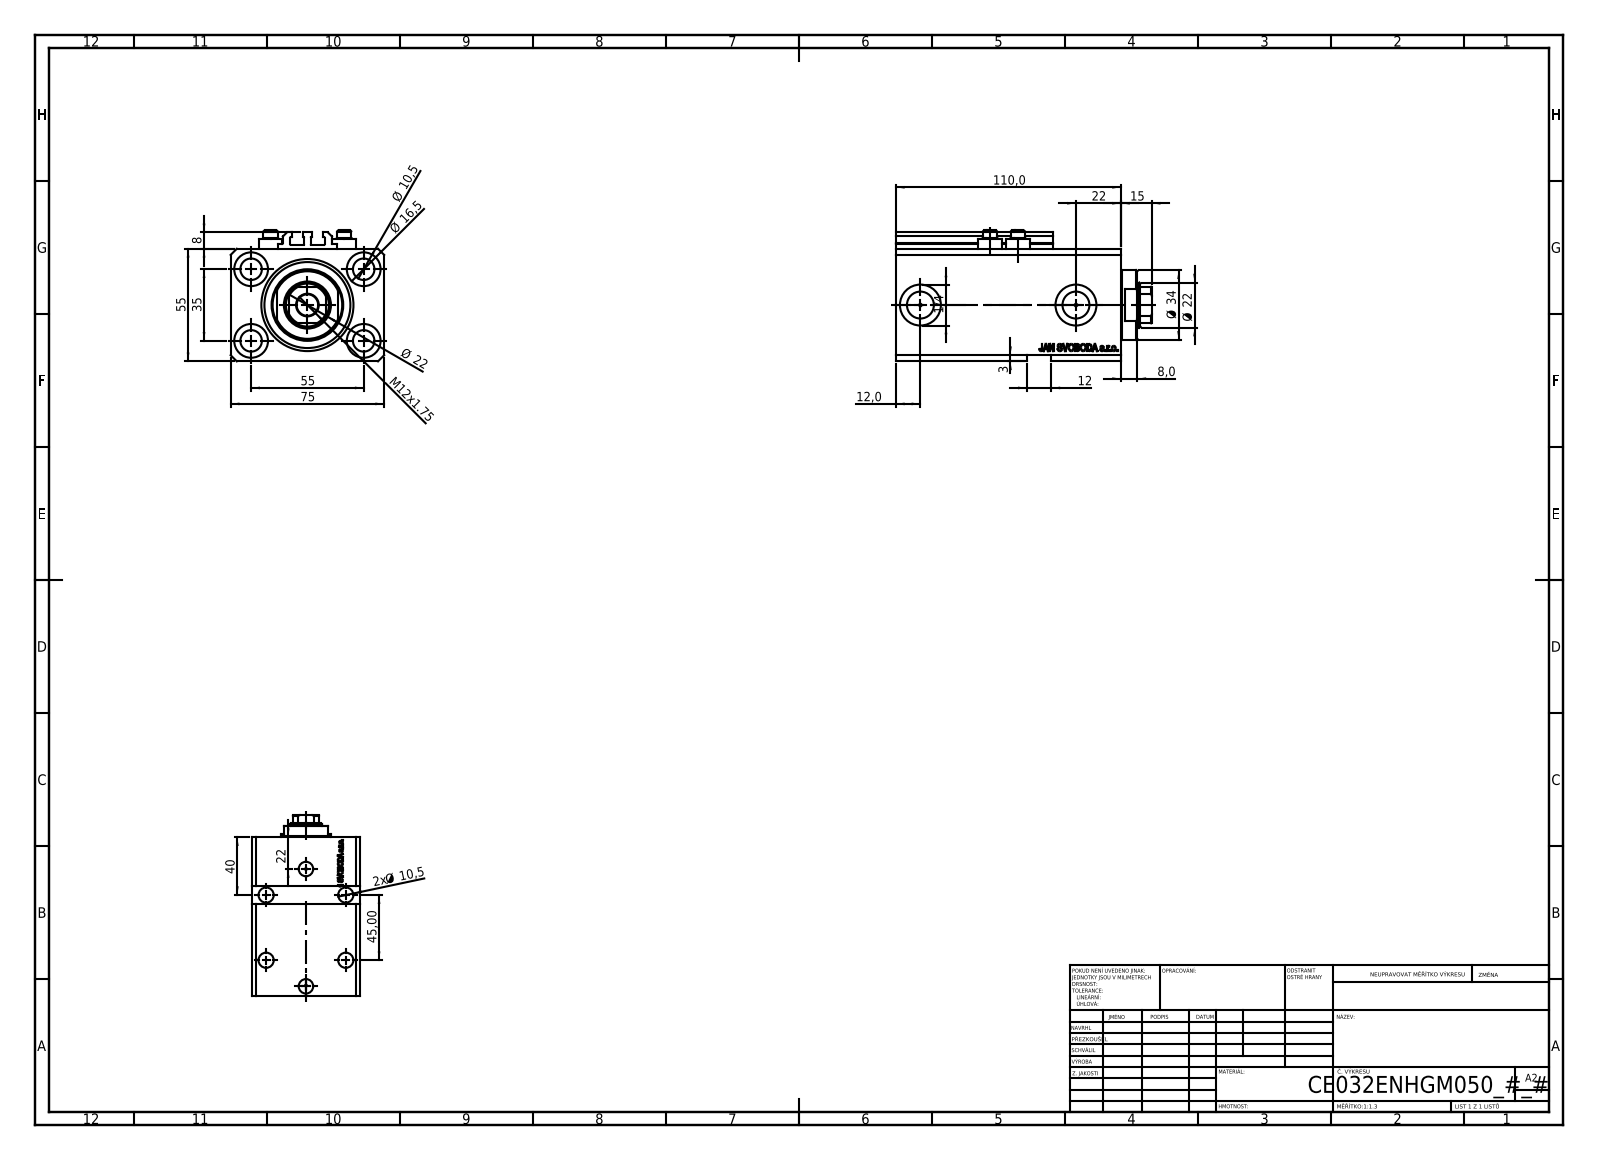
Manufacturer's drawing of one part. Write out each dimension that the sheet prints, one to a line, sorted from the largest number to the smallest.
110,0
75
55
55
45,00
40
35
Ø 34
Ø 22
22
Ø 22
22
Ø 16,5
15
M12x1.75
12,0
12
Ø 10,5
2x Ø 10,5
8
8,0
3
1/4
